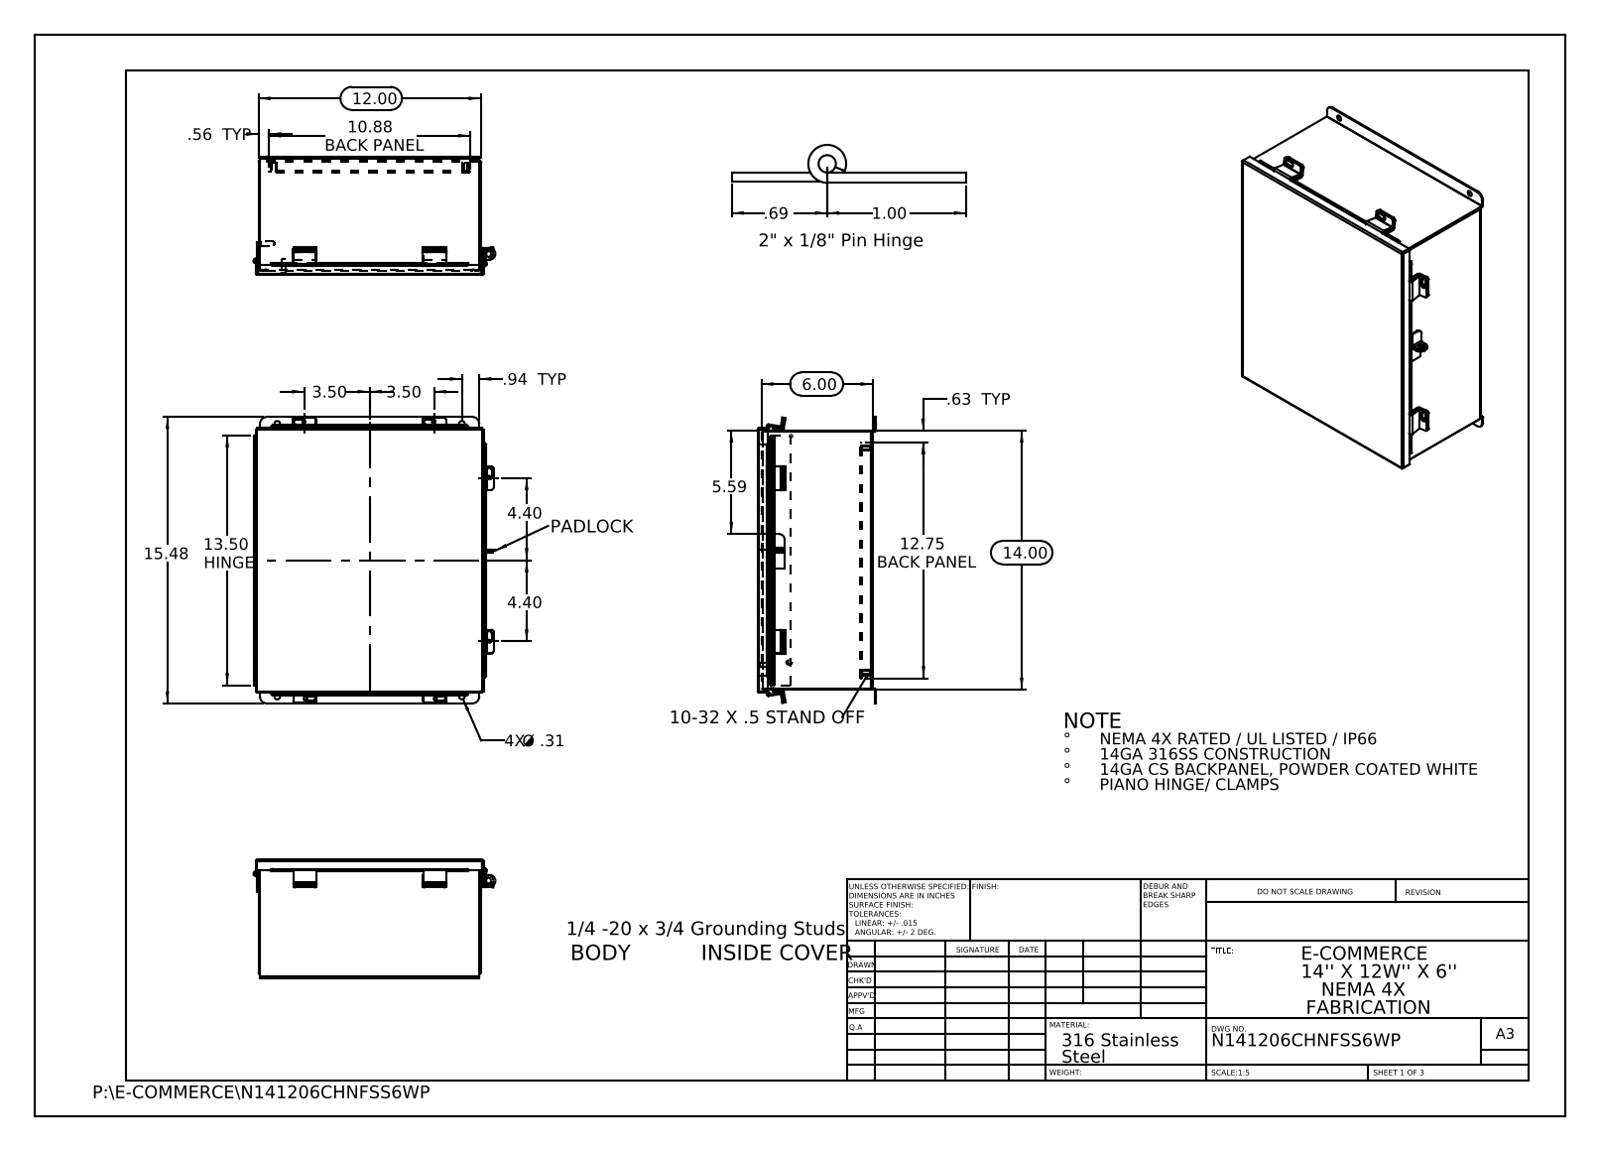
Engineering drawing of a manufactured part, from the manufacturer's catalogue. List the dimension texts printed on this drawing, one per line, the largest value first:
15.48
14.00
13.50 HINGE
12.75 BACK PANEL
12.00
10.88 BACK PANEL
6.00
5.59
4.40
4.40
3.50
3.50
1.00
.94 TYP
.69
.63 TYP
.56 TYP
4X Ø .31
